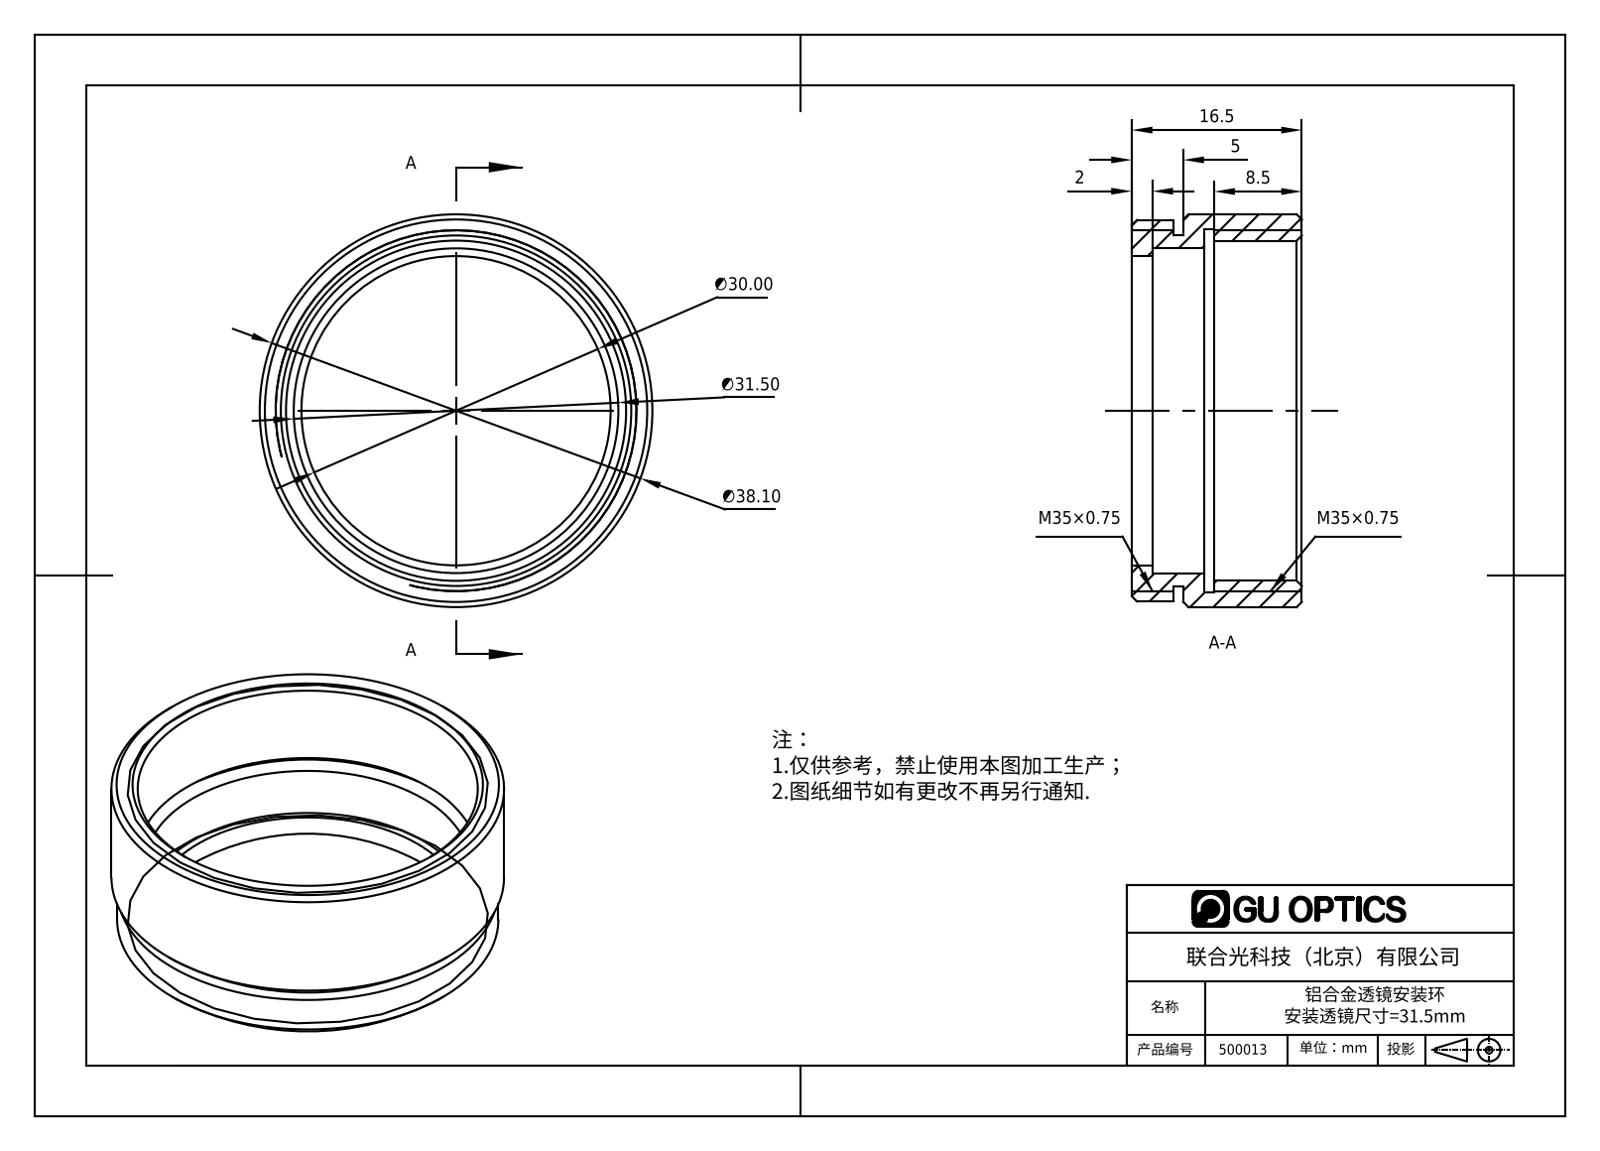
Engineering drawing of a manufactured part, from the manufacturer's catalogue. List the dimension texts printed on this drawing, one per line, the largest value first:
∅38.10
∅31.50
∅30.00
16.5
8.5
5
2
